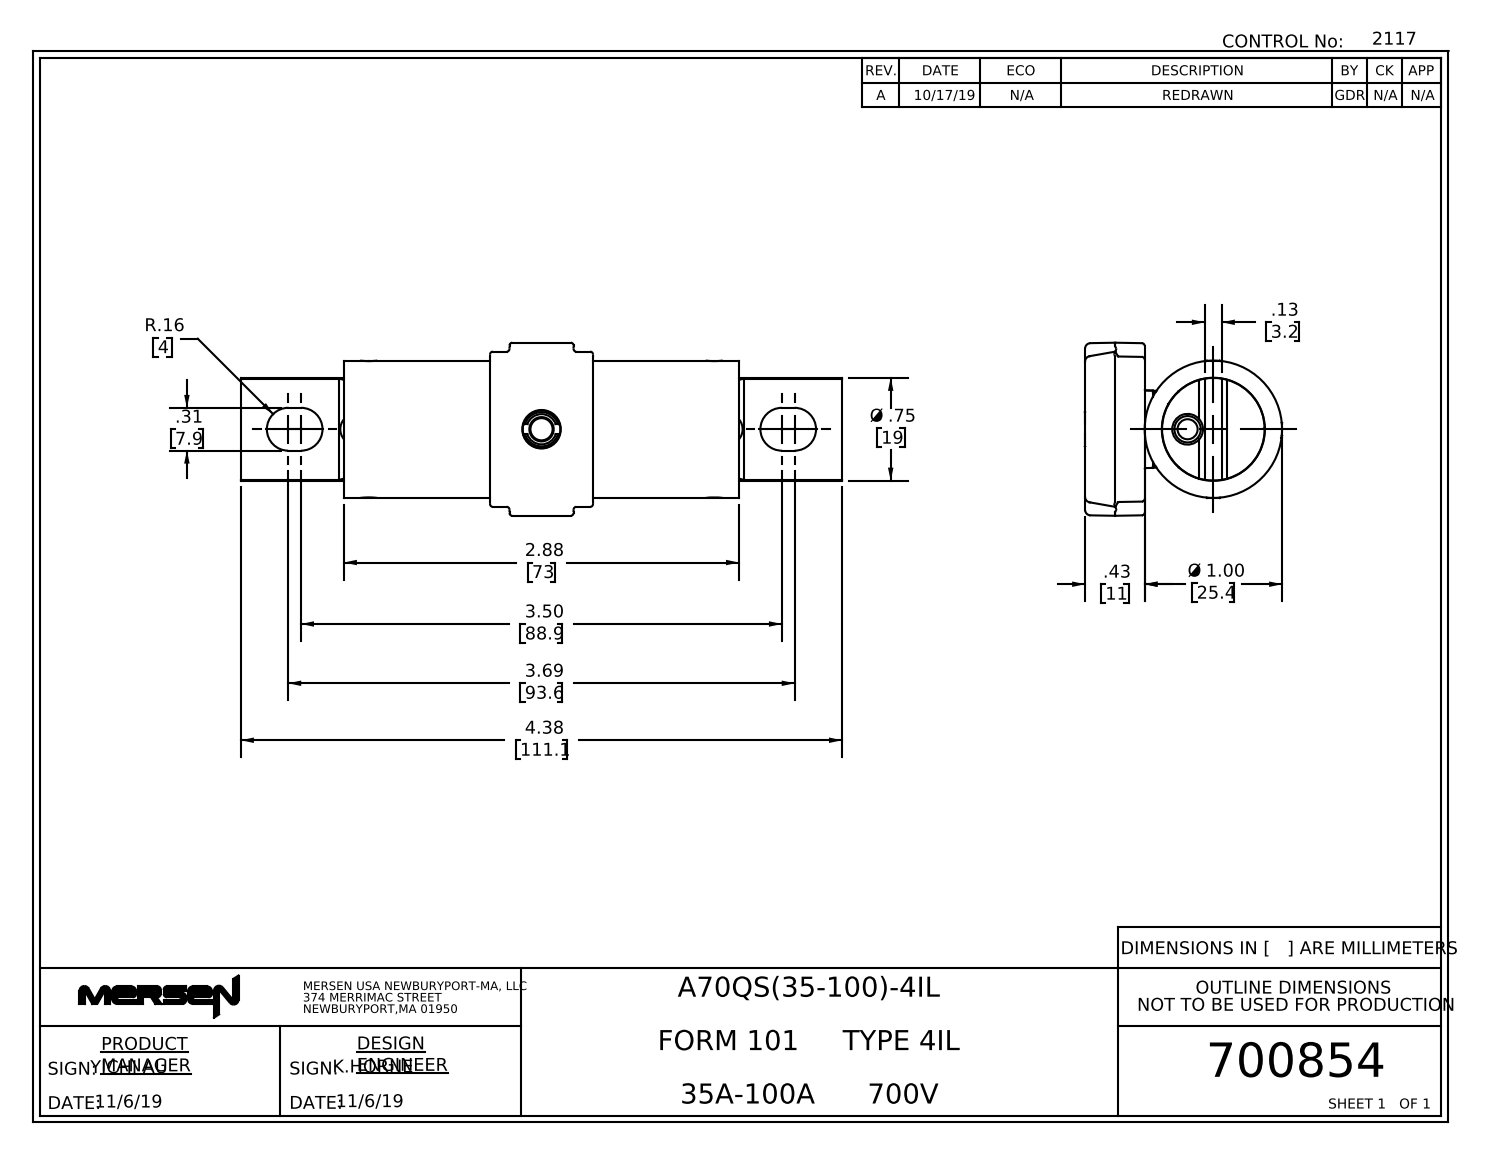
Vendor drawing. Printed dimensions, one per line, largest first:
4.38 111.1
3.69 93.6
3.50 88.9
2.88 73
Ø 1.00 25.4
Ø .75 19
.43 11
.31 7.9
R.16 4
.13 3.2
